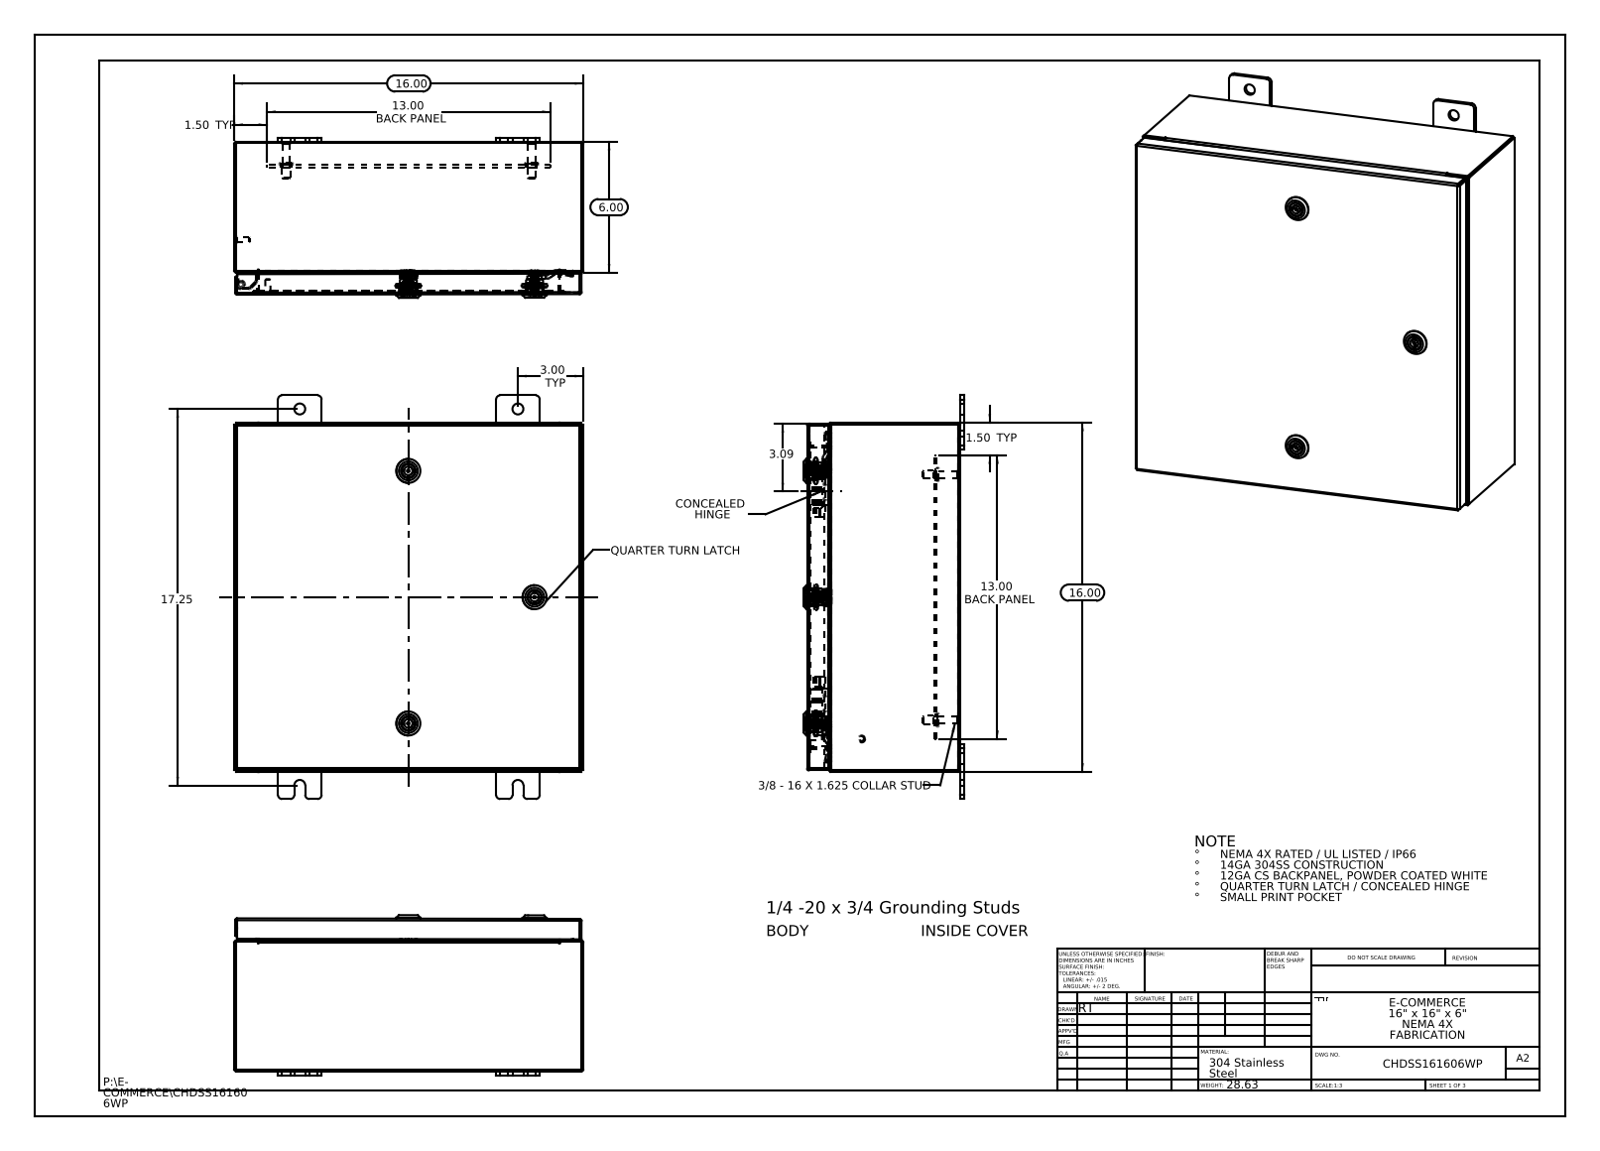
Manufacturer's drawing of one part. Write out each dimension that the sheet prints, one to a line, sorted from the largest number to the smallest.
17.25
16.00
16.00
13.00 BACK PANEL
13.00 BACK PANEL
6.00
3.09
3.00 TYP
1.50 TYP
1.50 TYP
